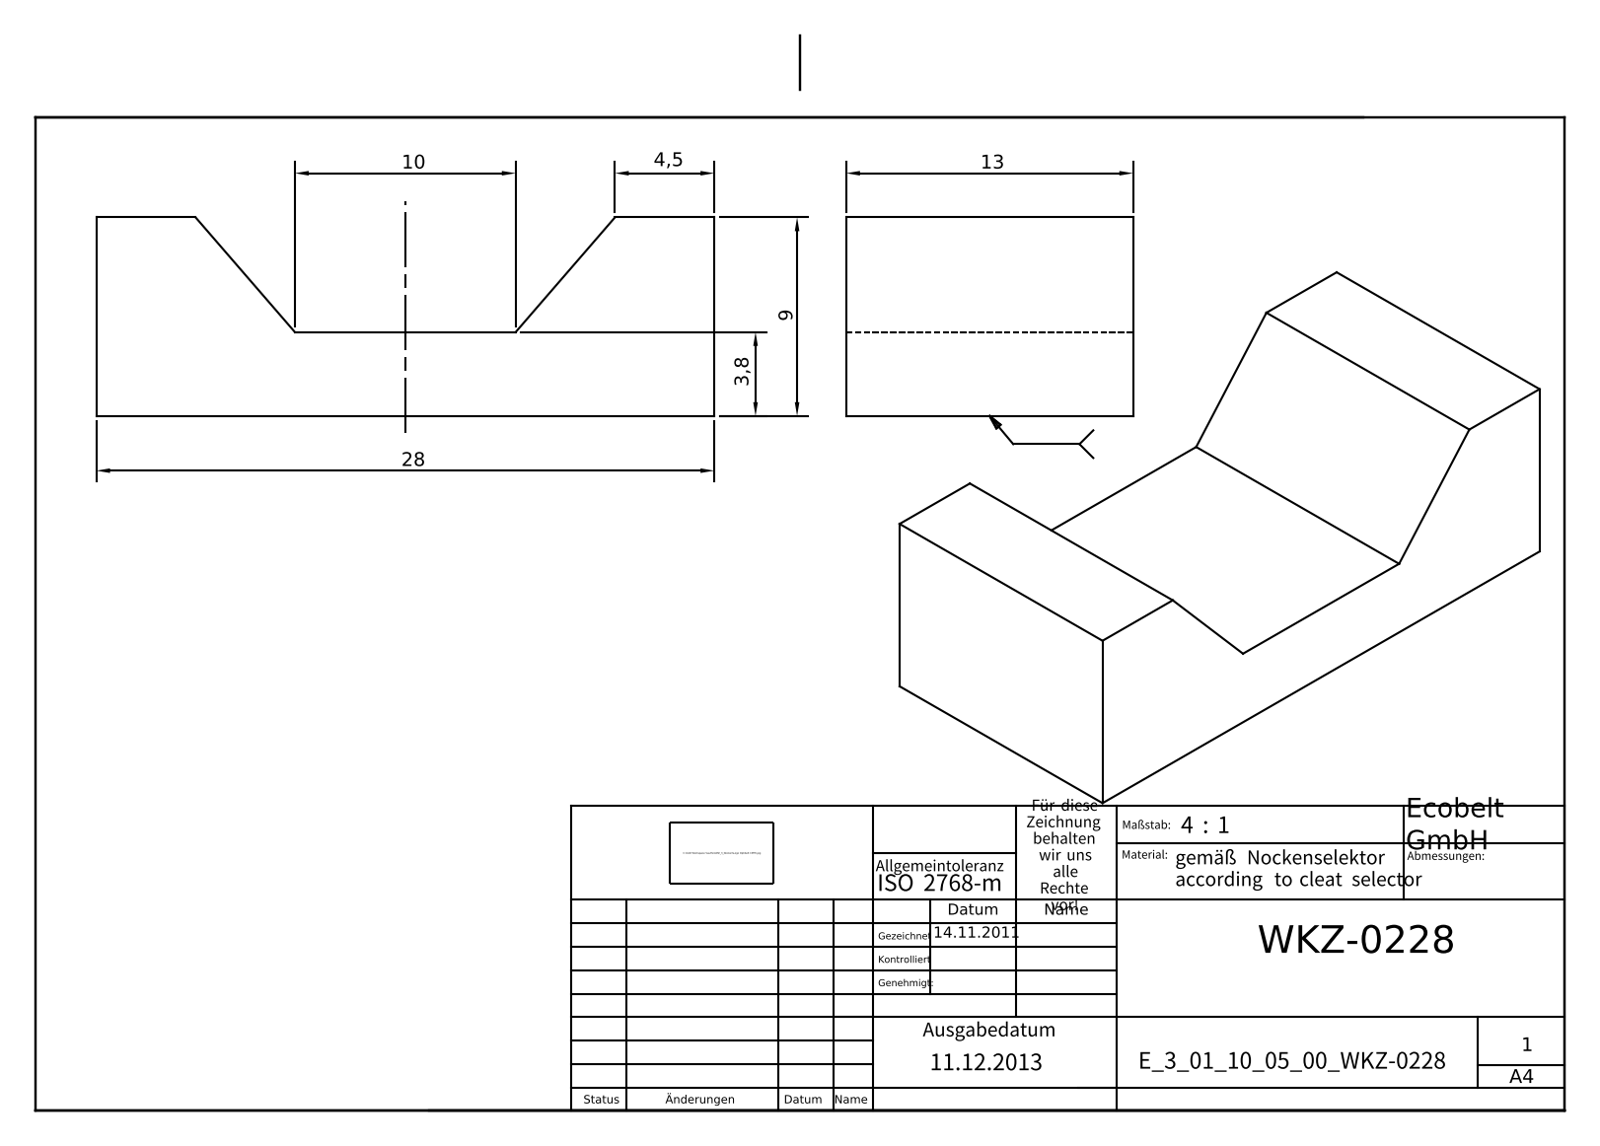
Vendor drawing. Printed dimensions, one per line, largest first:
28
13
10
9
4,5
3,8
